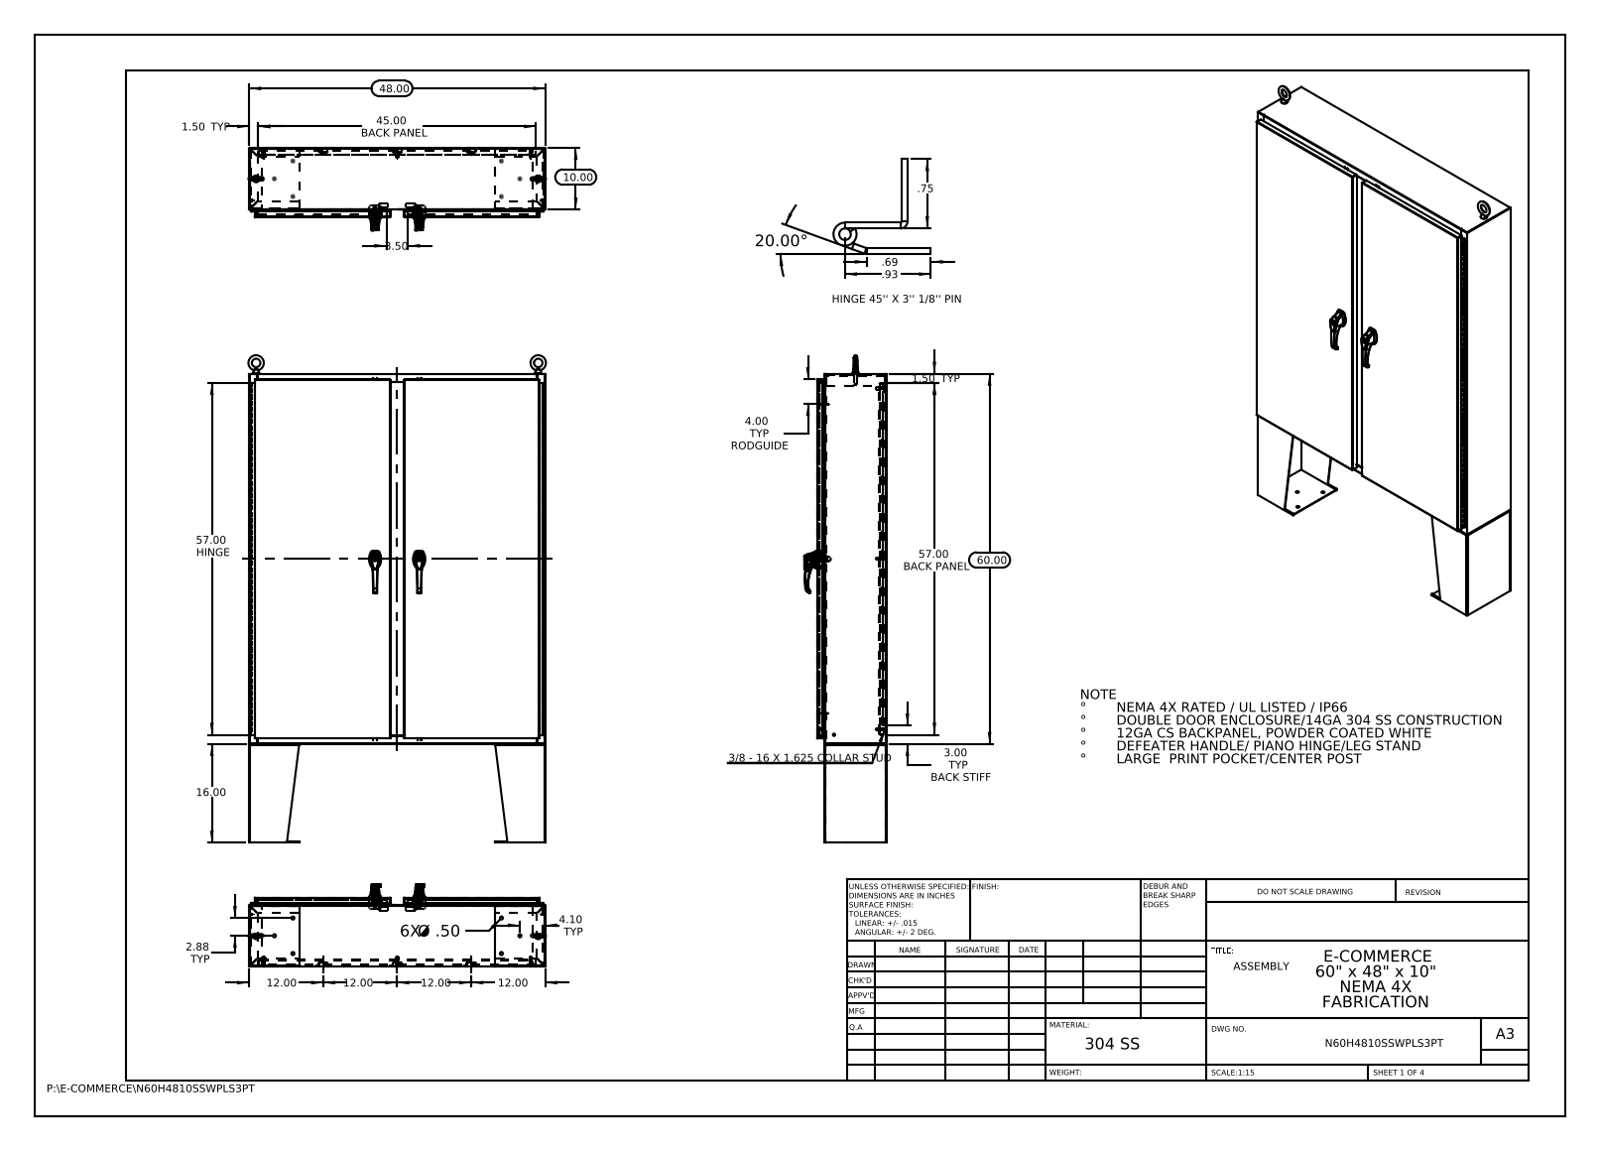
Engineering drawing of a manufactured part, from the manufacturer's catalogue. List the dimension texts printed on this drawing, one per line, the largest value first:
60.00
57.00 HINGE
57.00 BACK PANEL
48.00
45.00 BACK PANEL
20.00°
16.00
12.00
12.00
12.00
12.00
10.00
4.10 TYP
4.00 TYP RODGUIDE
3.50
3.00 TYP BACK STIFF
2.88 TYP
1.50 TYP
1.50 TYP
.93
.75
.69
6X Ø .50
